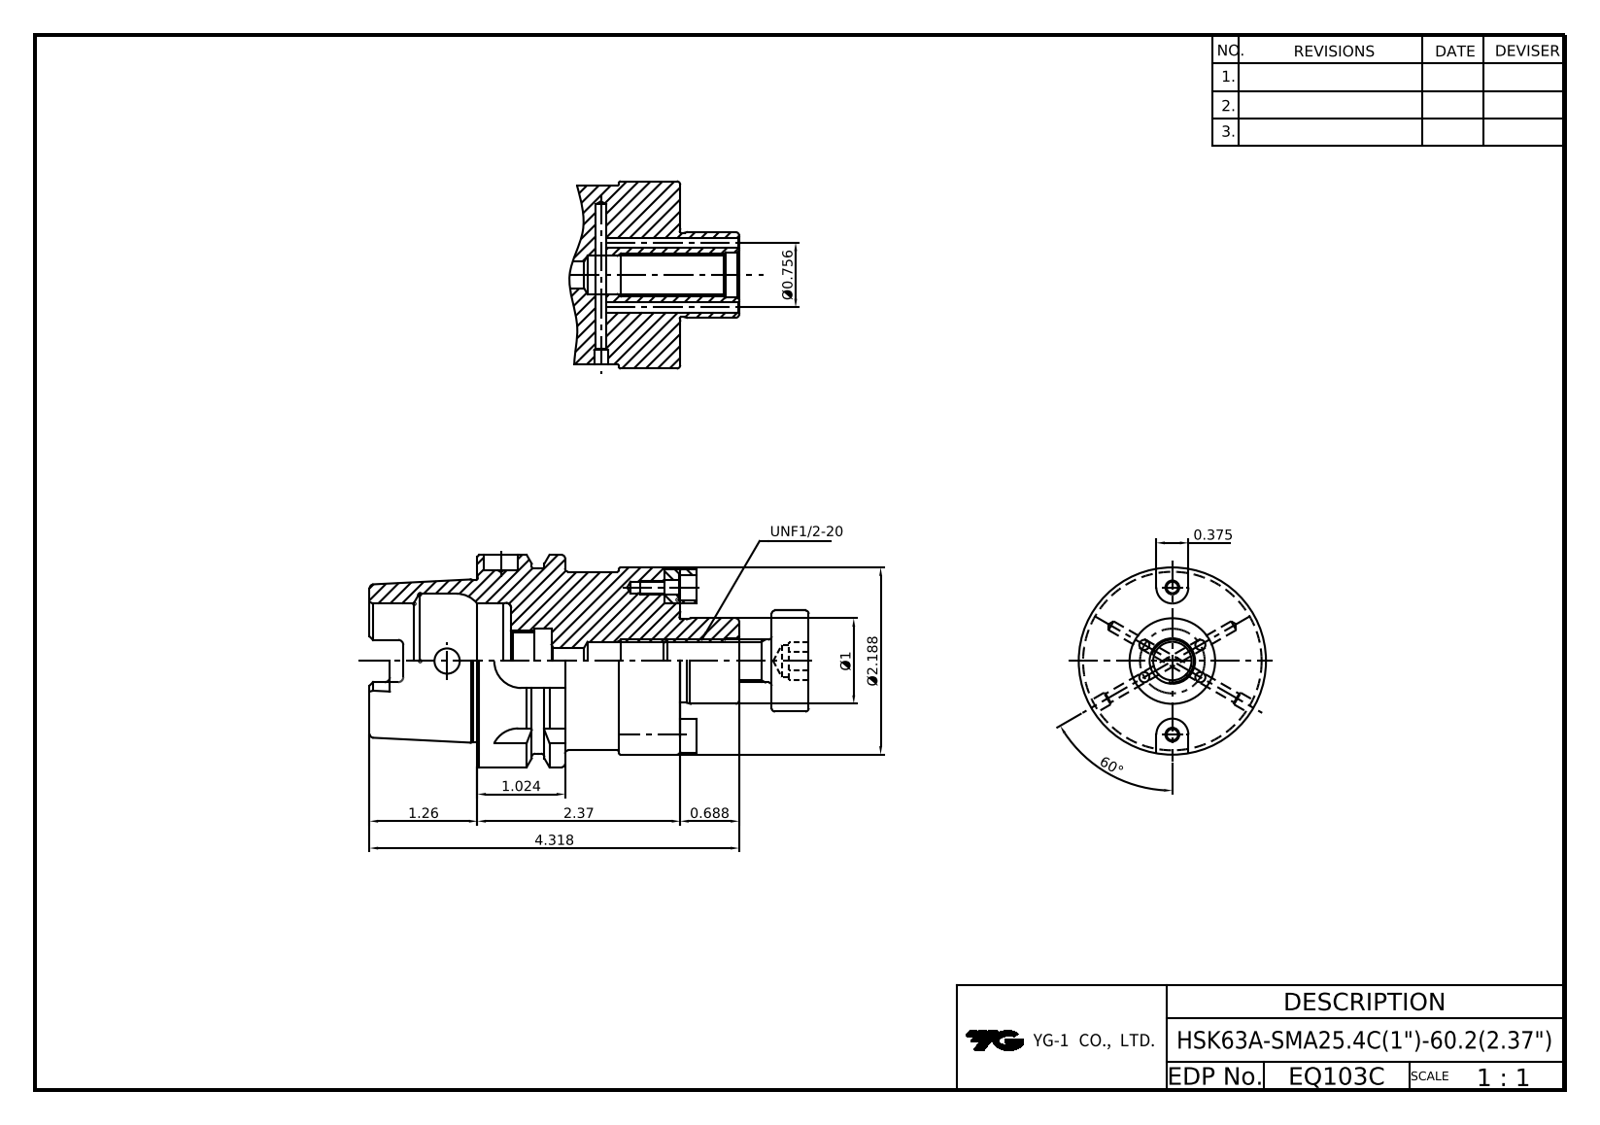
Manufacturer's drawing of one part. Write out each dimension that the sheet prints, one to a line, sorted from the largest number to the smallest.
60°
4.318
2.37
Ø2.188
1.26
1.024
Ø1
Ø0.756
0.688
0.375
